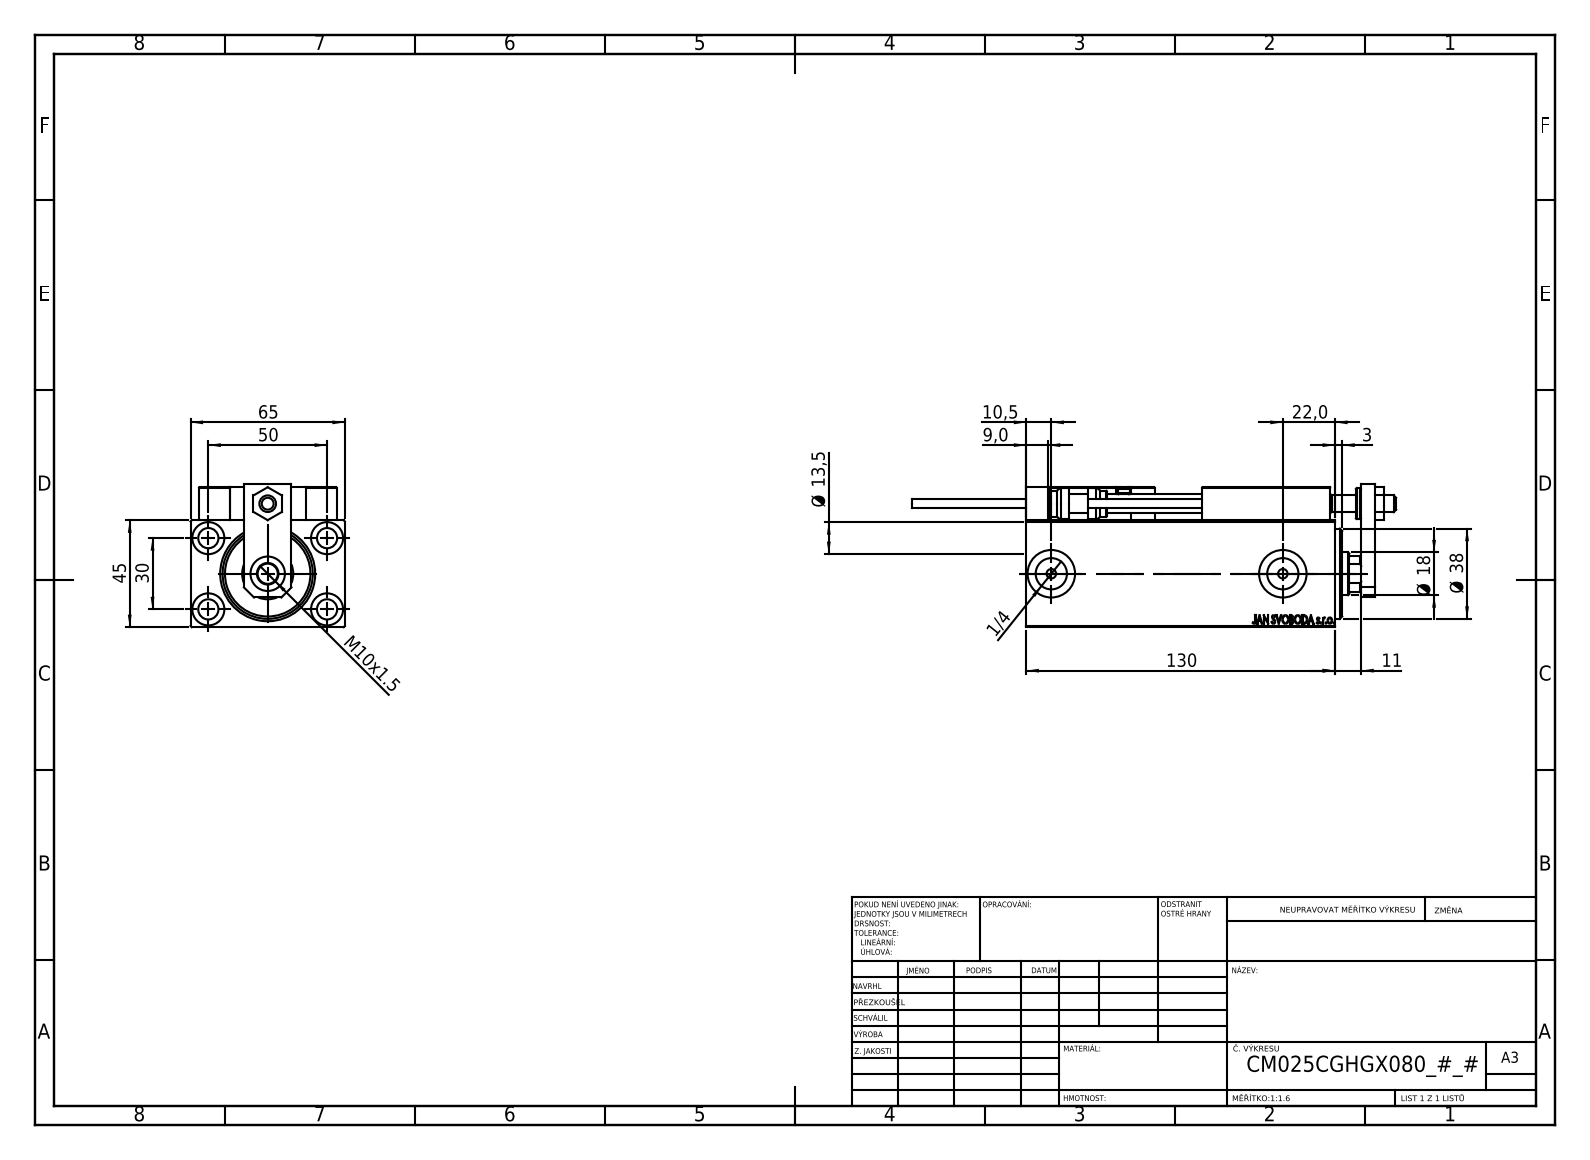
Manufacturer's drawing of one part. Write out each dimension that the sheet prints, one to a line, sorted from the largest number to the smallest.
130
65
50
45
Ø 38
30
22,0
Ø 18
Ø 13,5
11
10,5
M10x1.5
9,0
3
1/4
